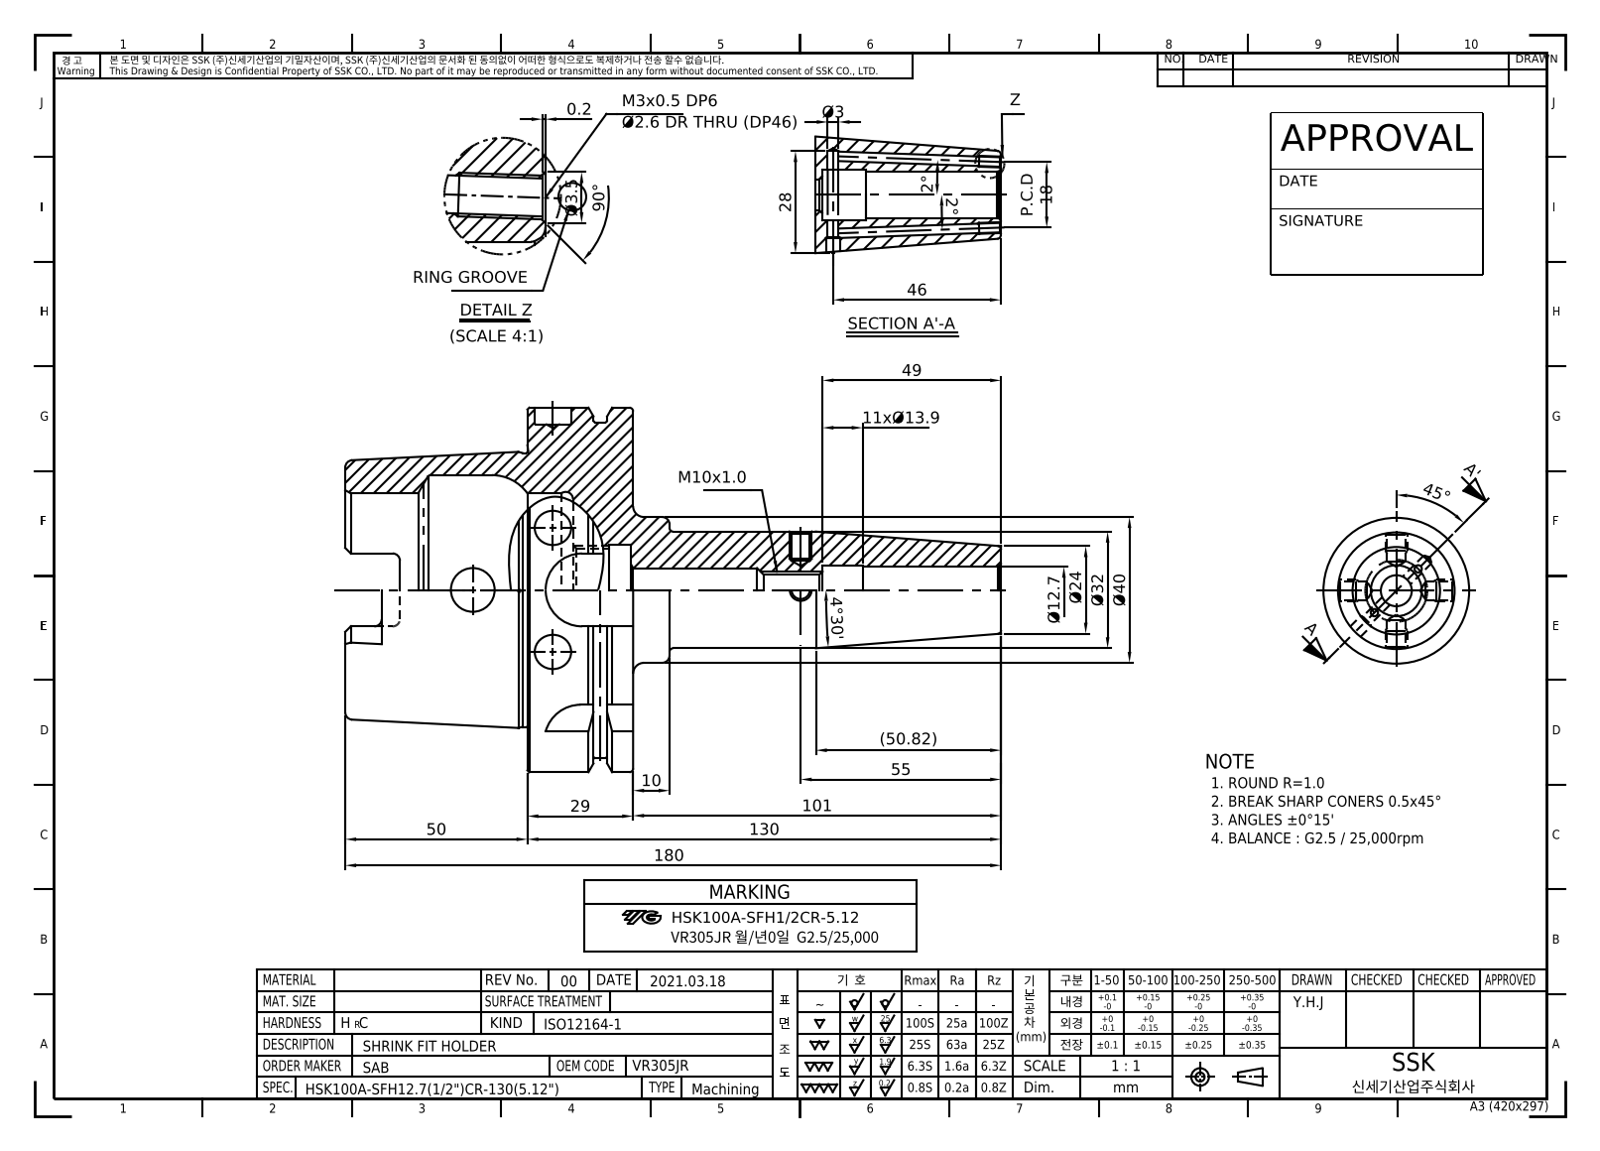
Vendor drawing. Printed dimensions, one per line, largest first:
180
130
101
90°
55
(50.82)
50
49
46
45°
Ø40
Ø32
29
28
Ø24
P.C.D 18
11xØ13.9
Ø12.7
10
4°30'
Ø3.5
Ø3
2°
2°
0.2
